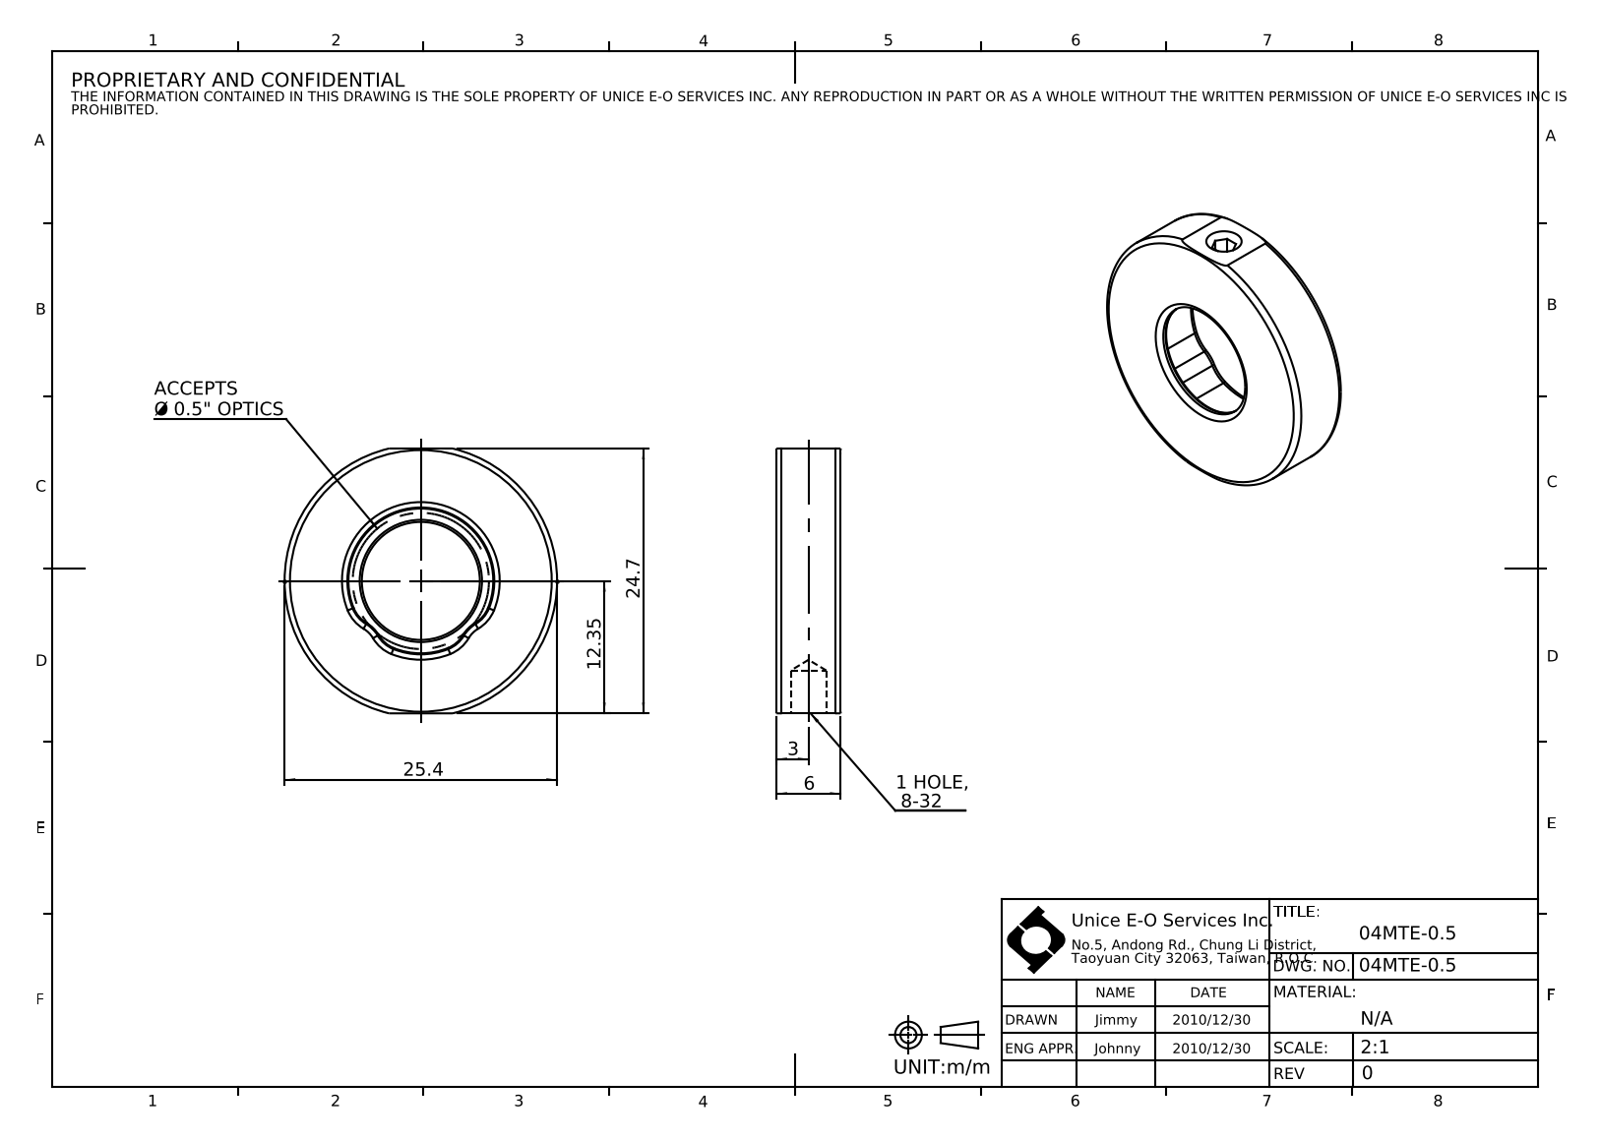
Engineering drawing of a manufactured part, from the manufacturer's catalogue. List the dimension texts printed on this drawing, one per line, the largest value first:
25.4
24.7
12.35
6
3
ACCEPTS Ø 0.5" OPTICS
